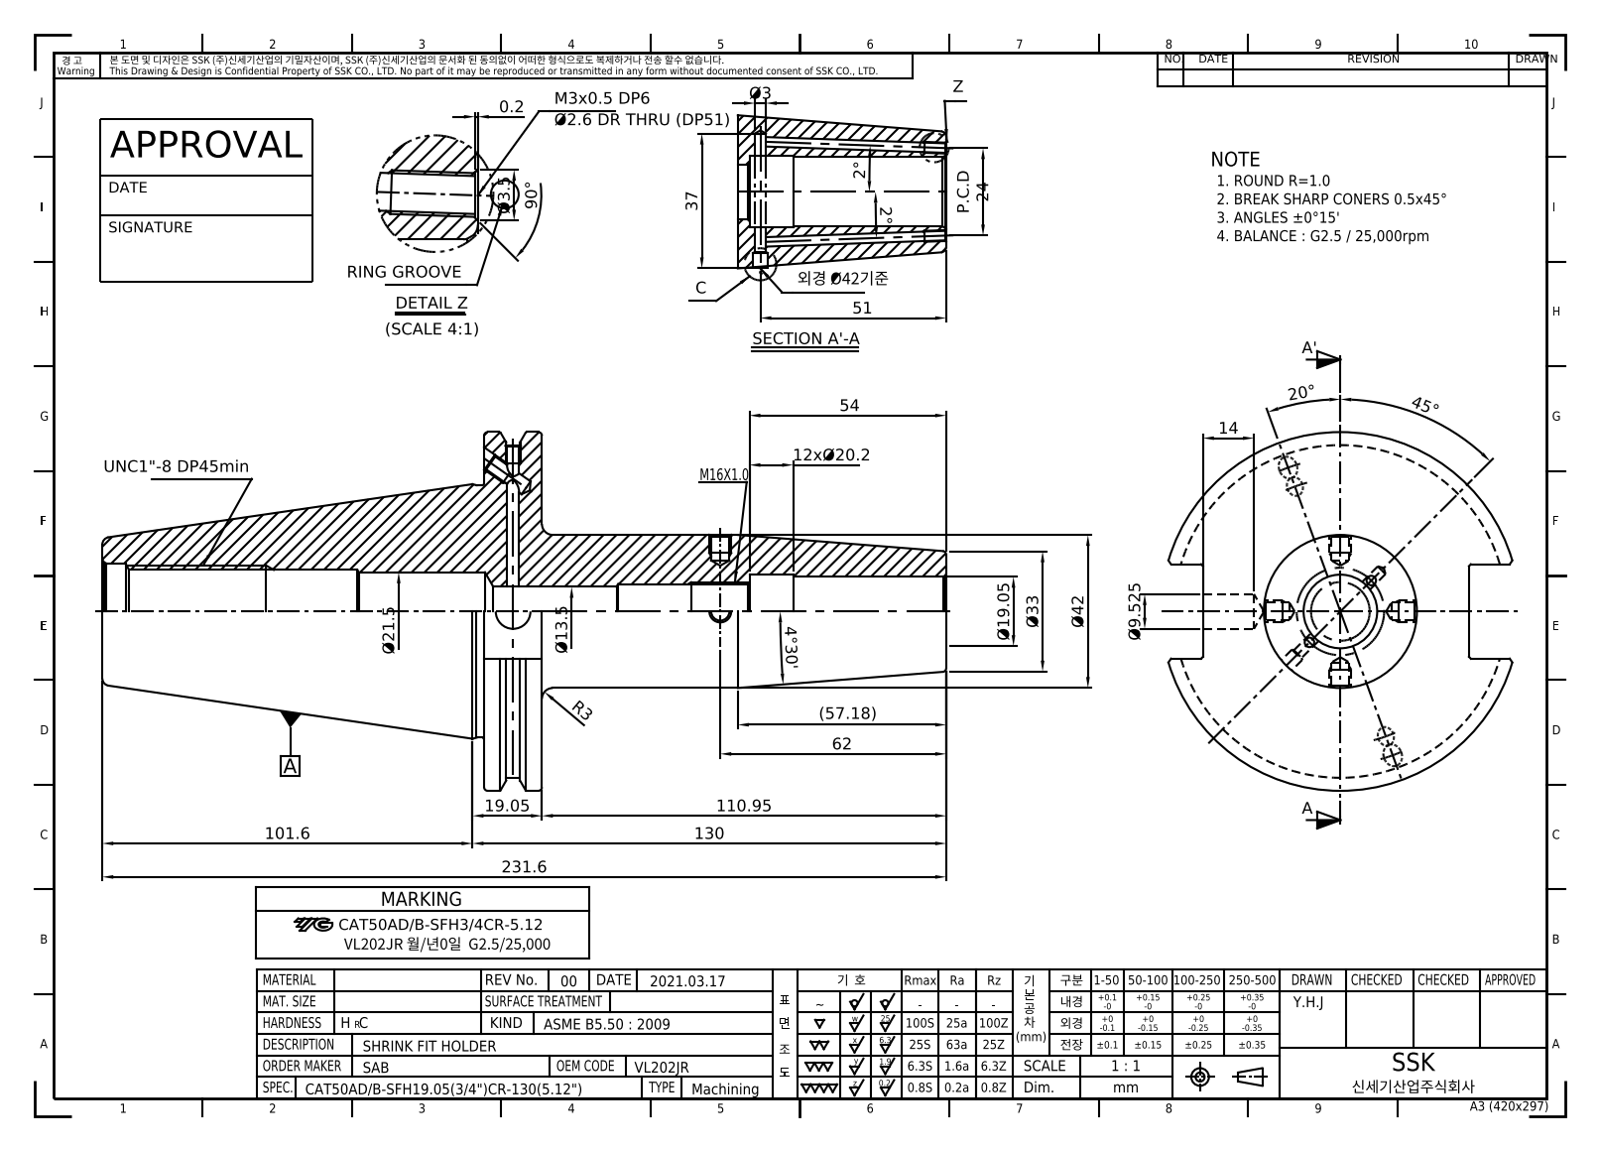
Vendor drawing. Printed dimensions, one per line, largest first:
231.6
130
110.95
101.6
90°
62
(57.18)
54
51
45°
Ø42
37
Ø33
P.C.D 24
Ø21.5
12xØ20.2
20°
Ø19.05
19.05
14
Ø13.5
Ø9.525
4°30'
Ø3.5
R3
Ø3
2°
2°
0.2
